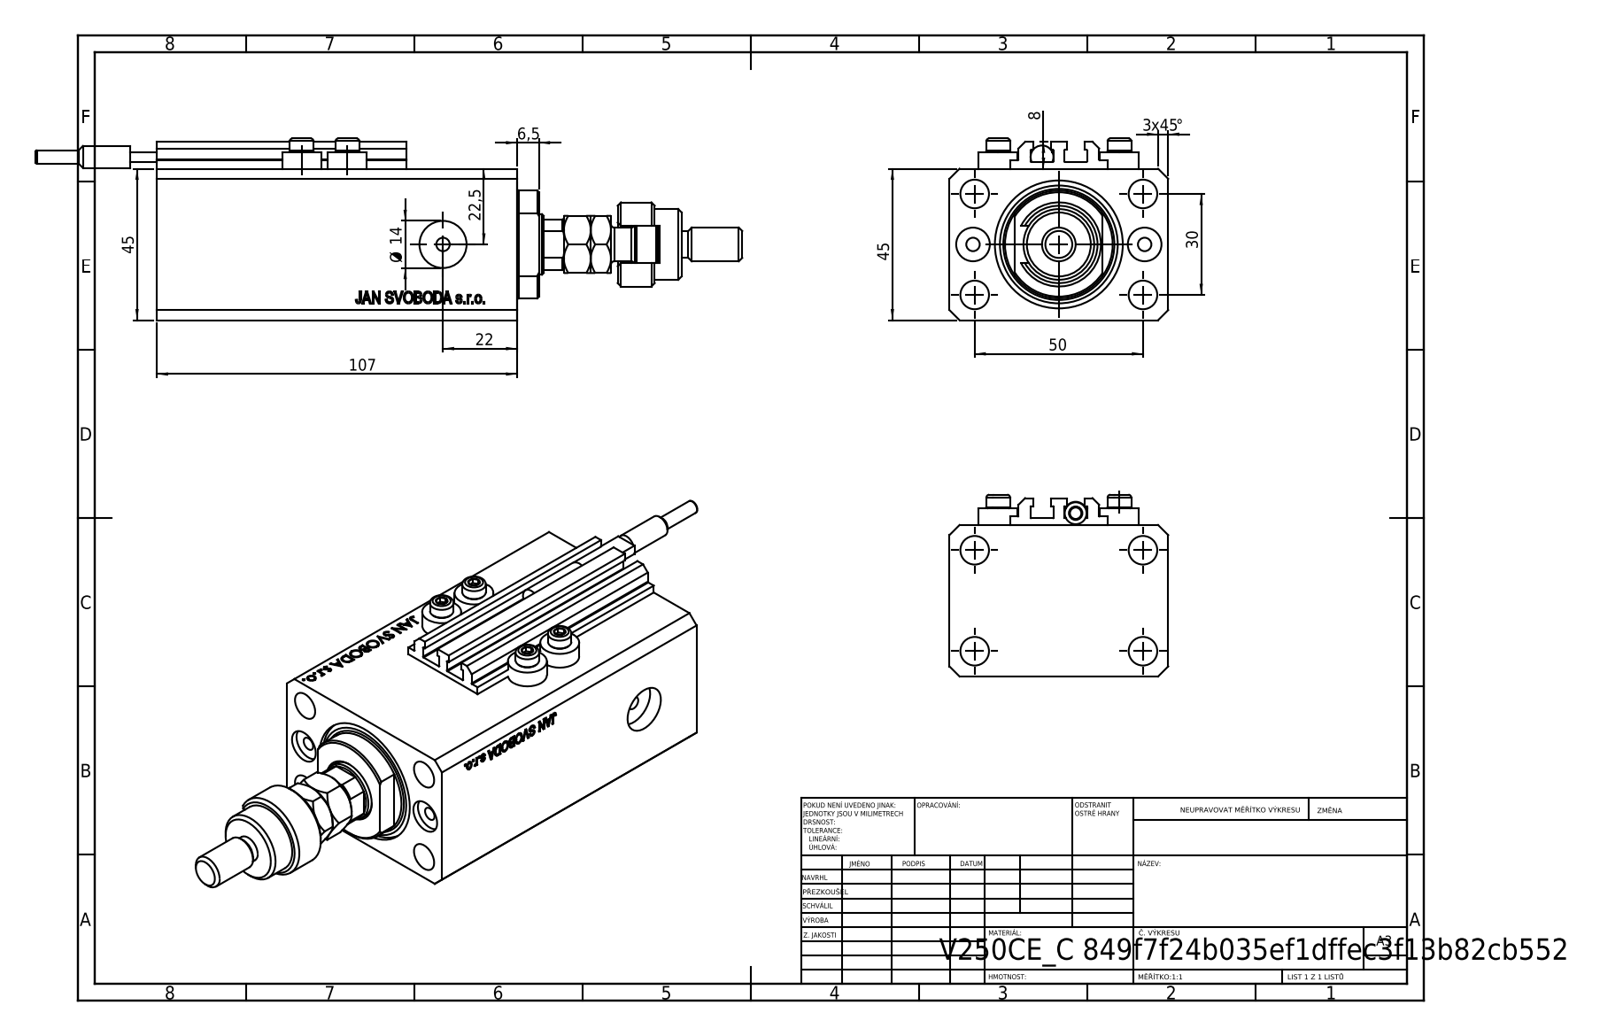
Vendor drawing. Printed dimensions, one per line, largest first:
107
50
45
3 x45 °
45
30
22,5
22
Ø 14
8
6,5
